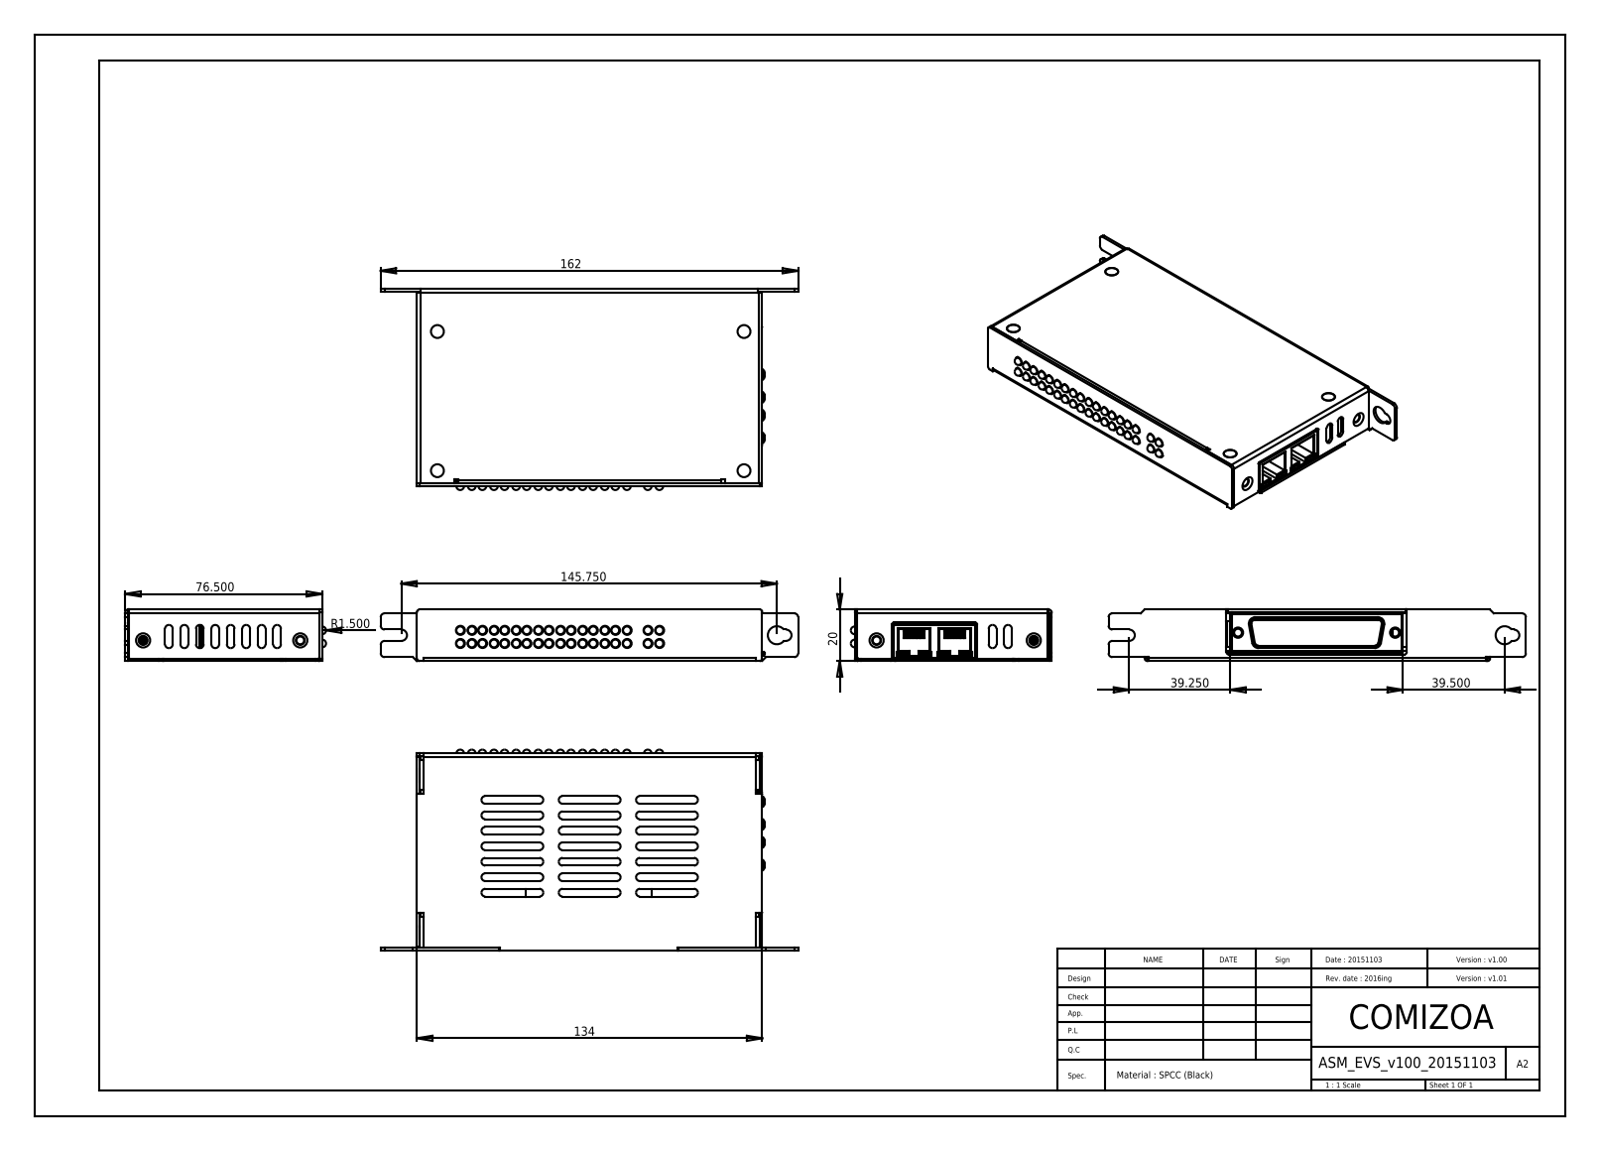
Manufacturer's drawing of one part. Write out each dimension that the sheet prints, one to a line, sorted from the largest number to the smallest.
162
145.750
134
76.500
39.500
39.250
20
R1.500
